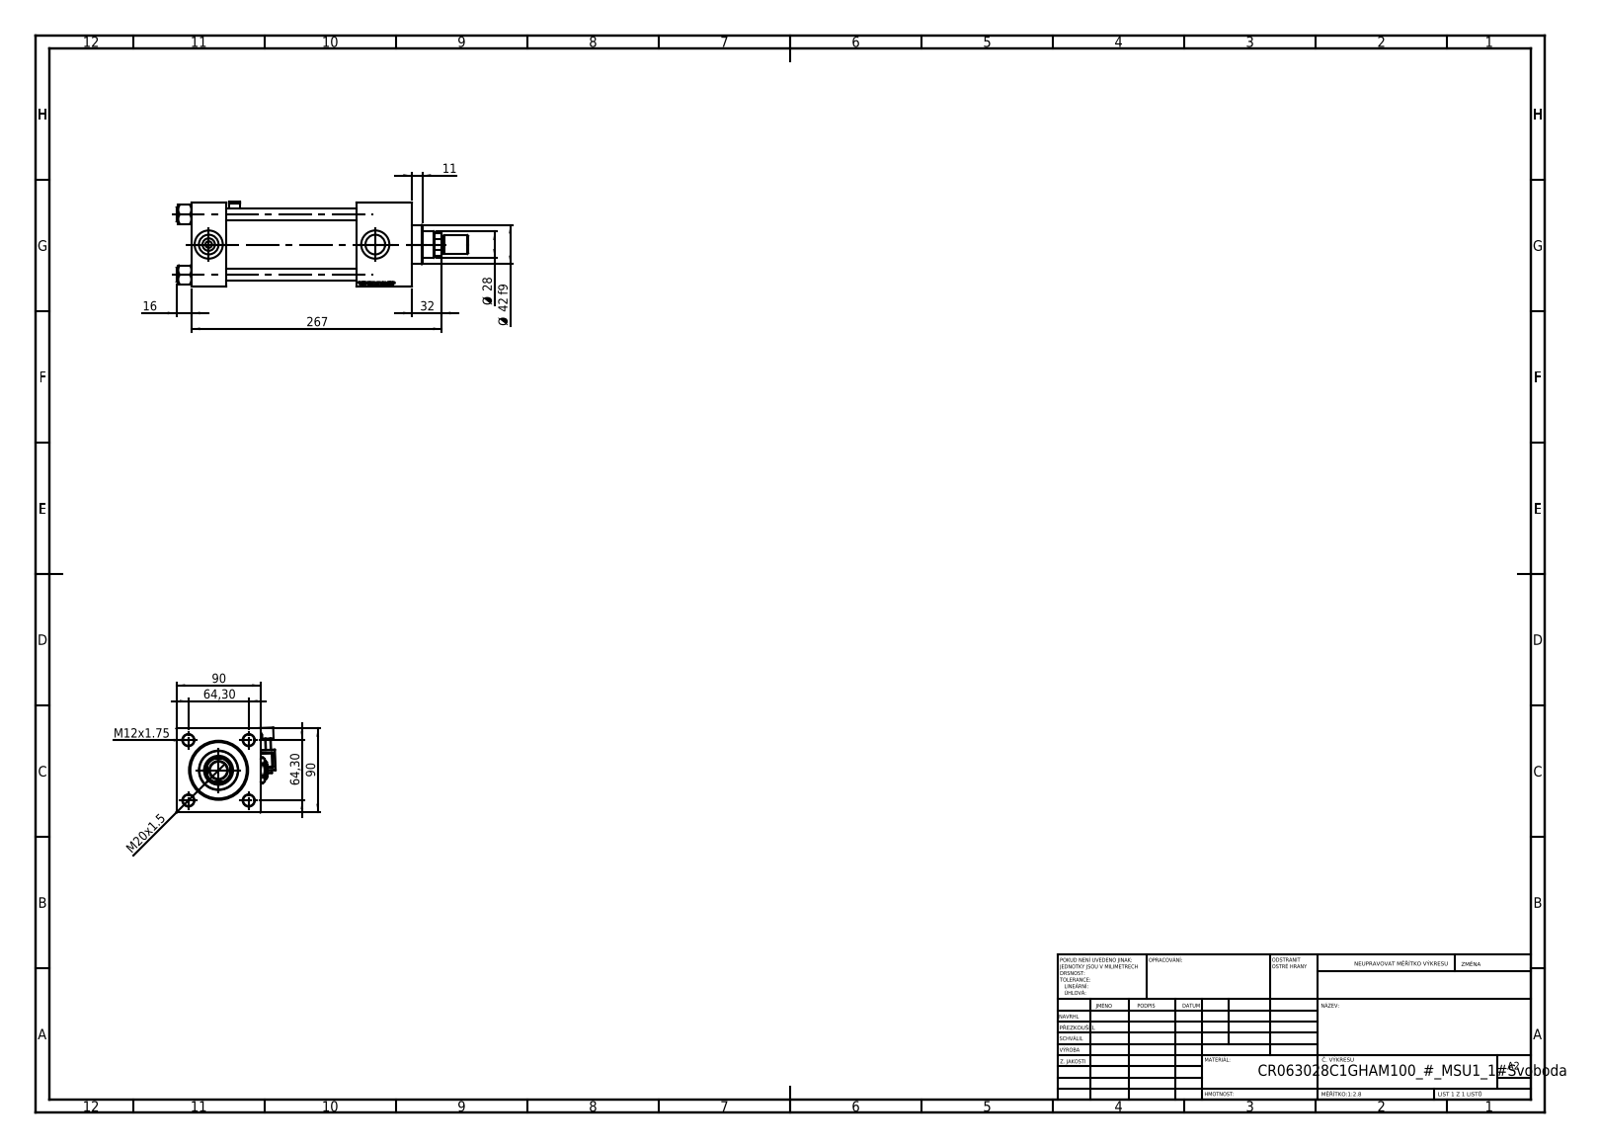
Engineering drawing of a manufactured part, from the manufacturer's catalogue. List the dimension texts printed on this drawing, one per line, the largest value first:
267
90
90
64,30
64,30
Ø 42 f9
32
Ø 28
M20x1.5
16
M12x1.75
11
